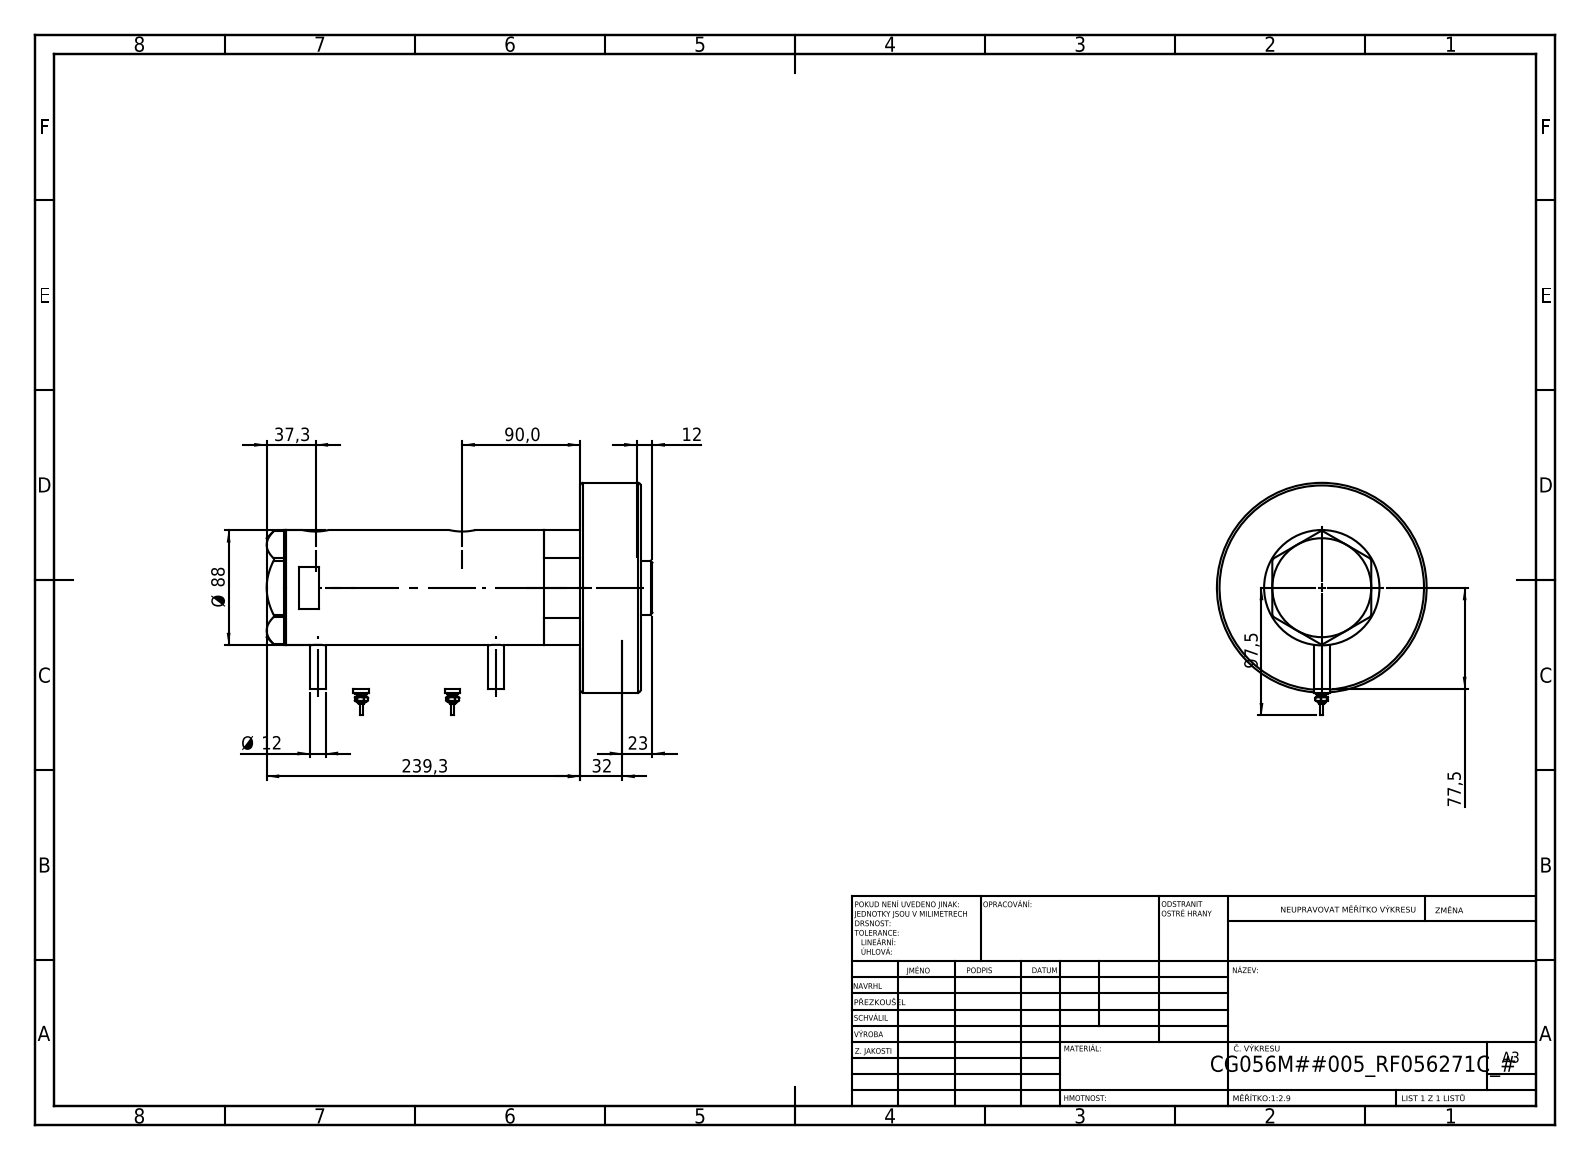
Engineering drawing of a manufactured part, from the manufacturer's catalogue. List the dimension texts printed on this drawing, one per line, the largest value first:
239,3
97,5
90,0
Ø 88
77,5
37,3
32
23
12
Ø 12
